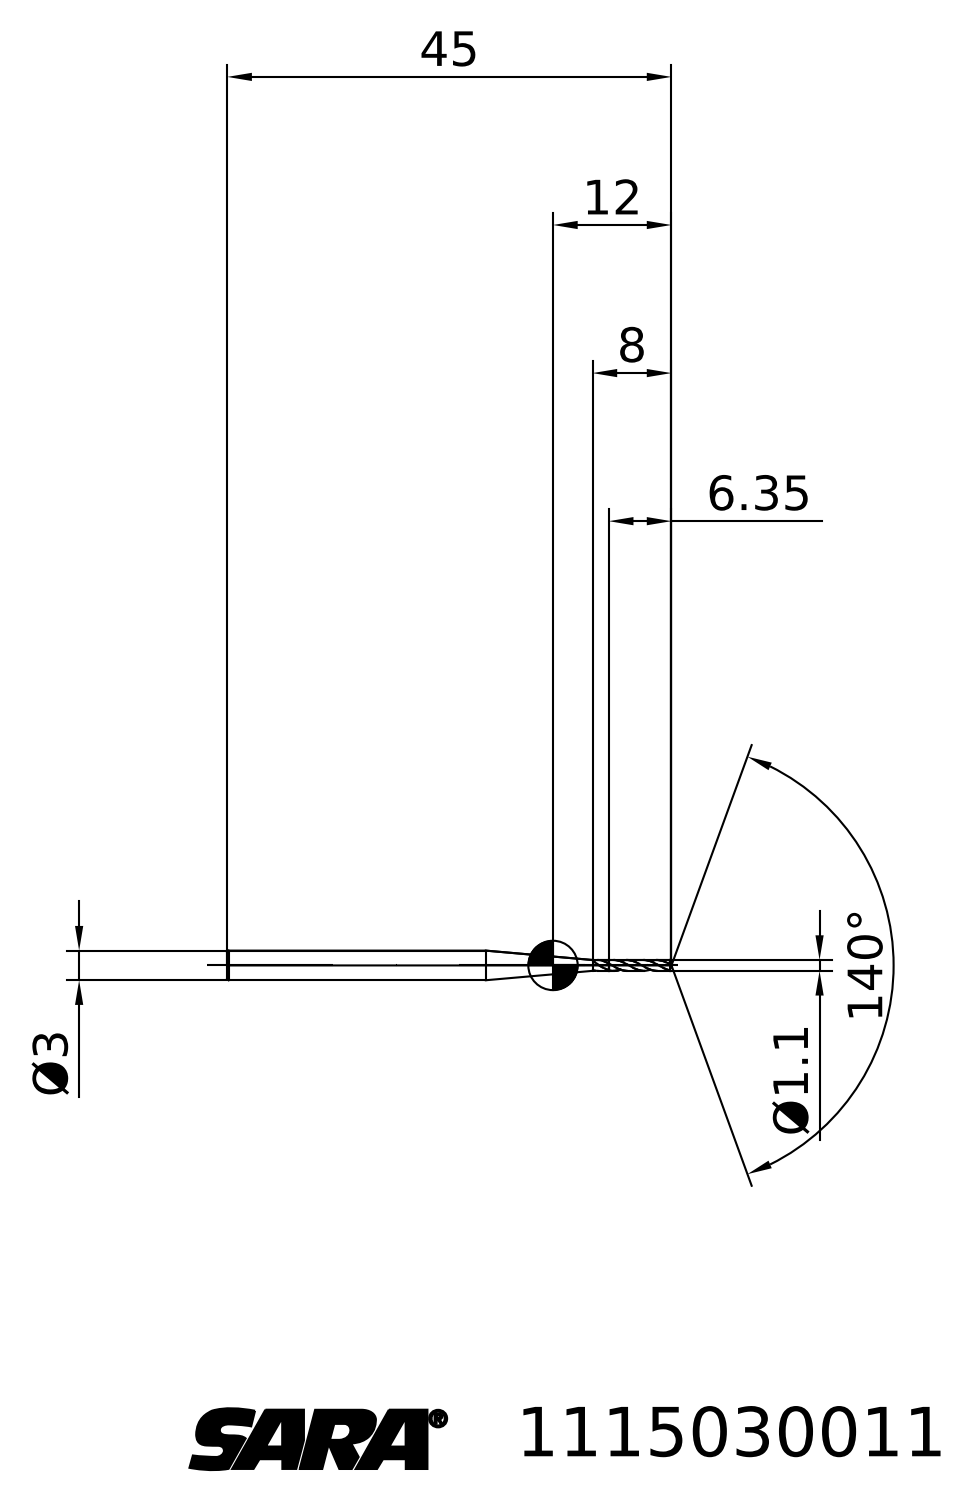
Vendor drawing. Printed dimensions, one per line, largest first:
140°
45
12
8
6.35
Ø3
Ø1.1
